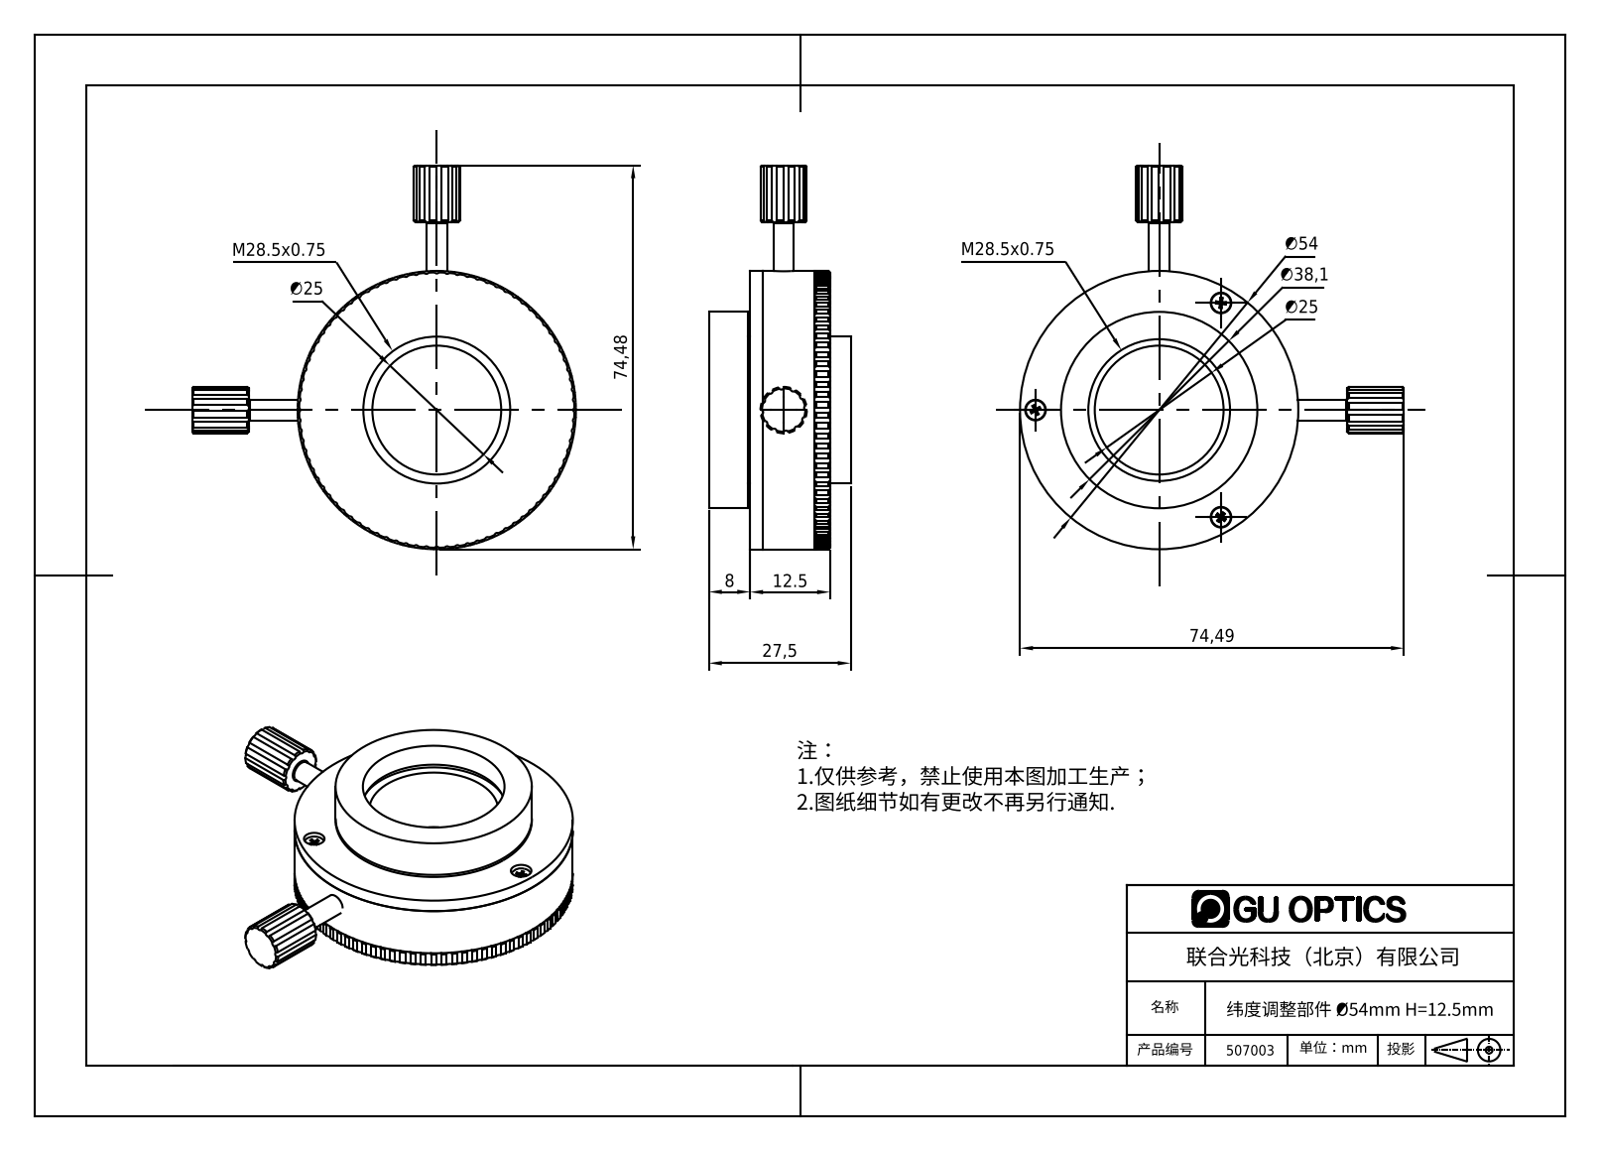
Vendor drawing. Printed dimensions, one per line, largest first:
74,49
74,48
∅54
∅38,1
27,5
∅25
∅25
12.5
8
